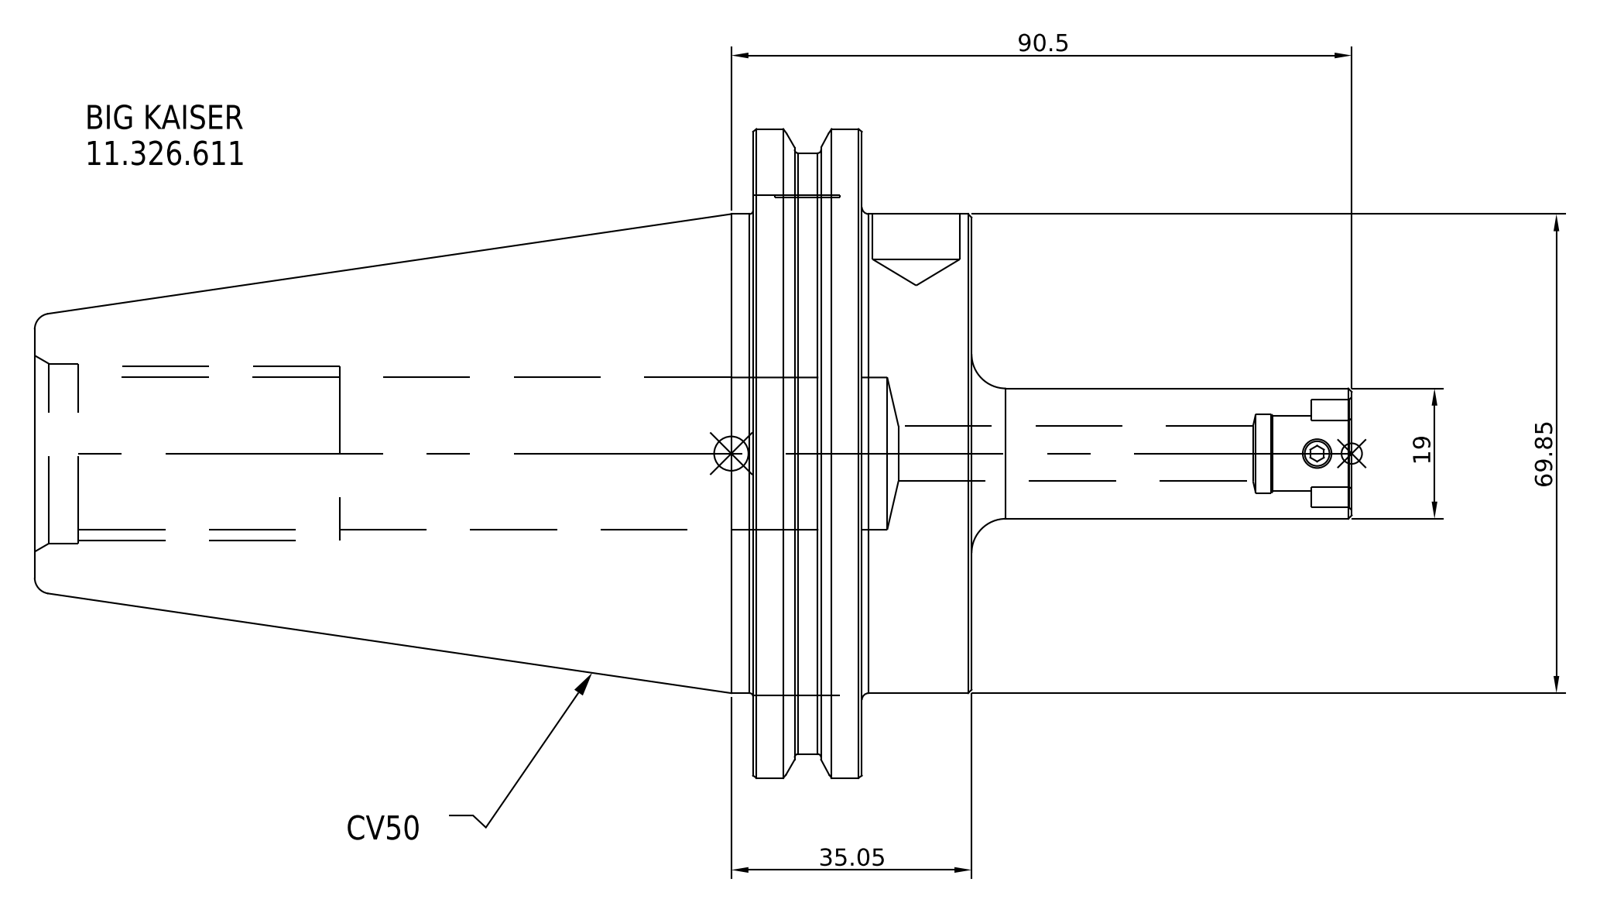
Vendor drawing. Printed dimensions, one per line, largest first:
90.5
69.85
35.05
19
